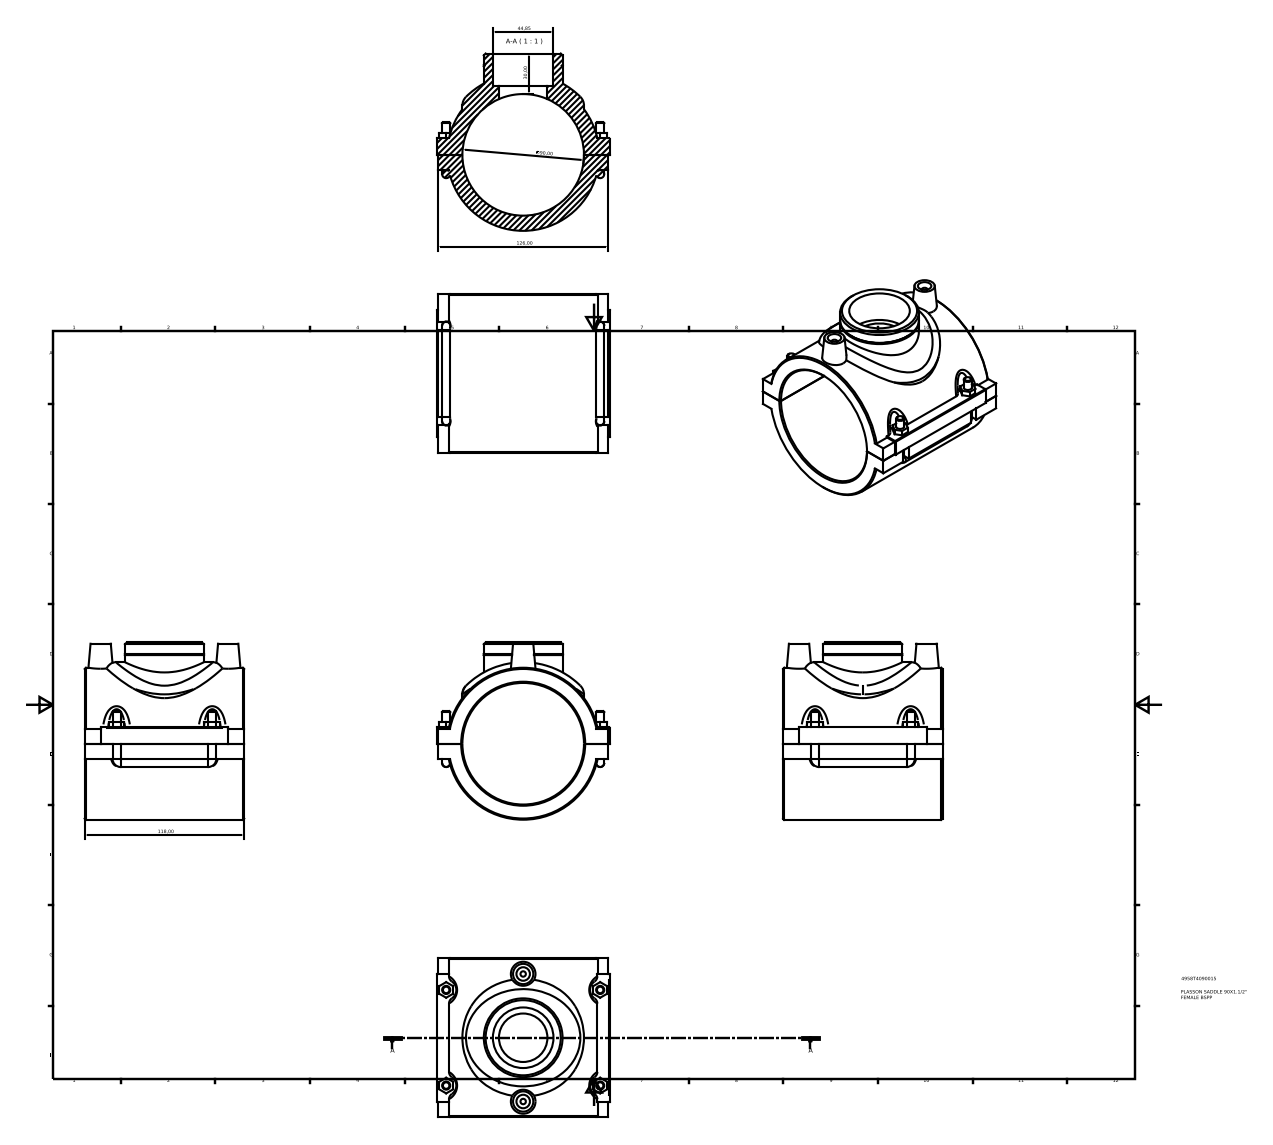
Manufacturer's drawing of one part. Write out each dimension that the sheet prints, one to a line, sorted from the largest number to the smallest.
126,00
118,00
∅90,00
44,85
30,00
